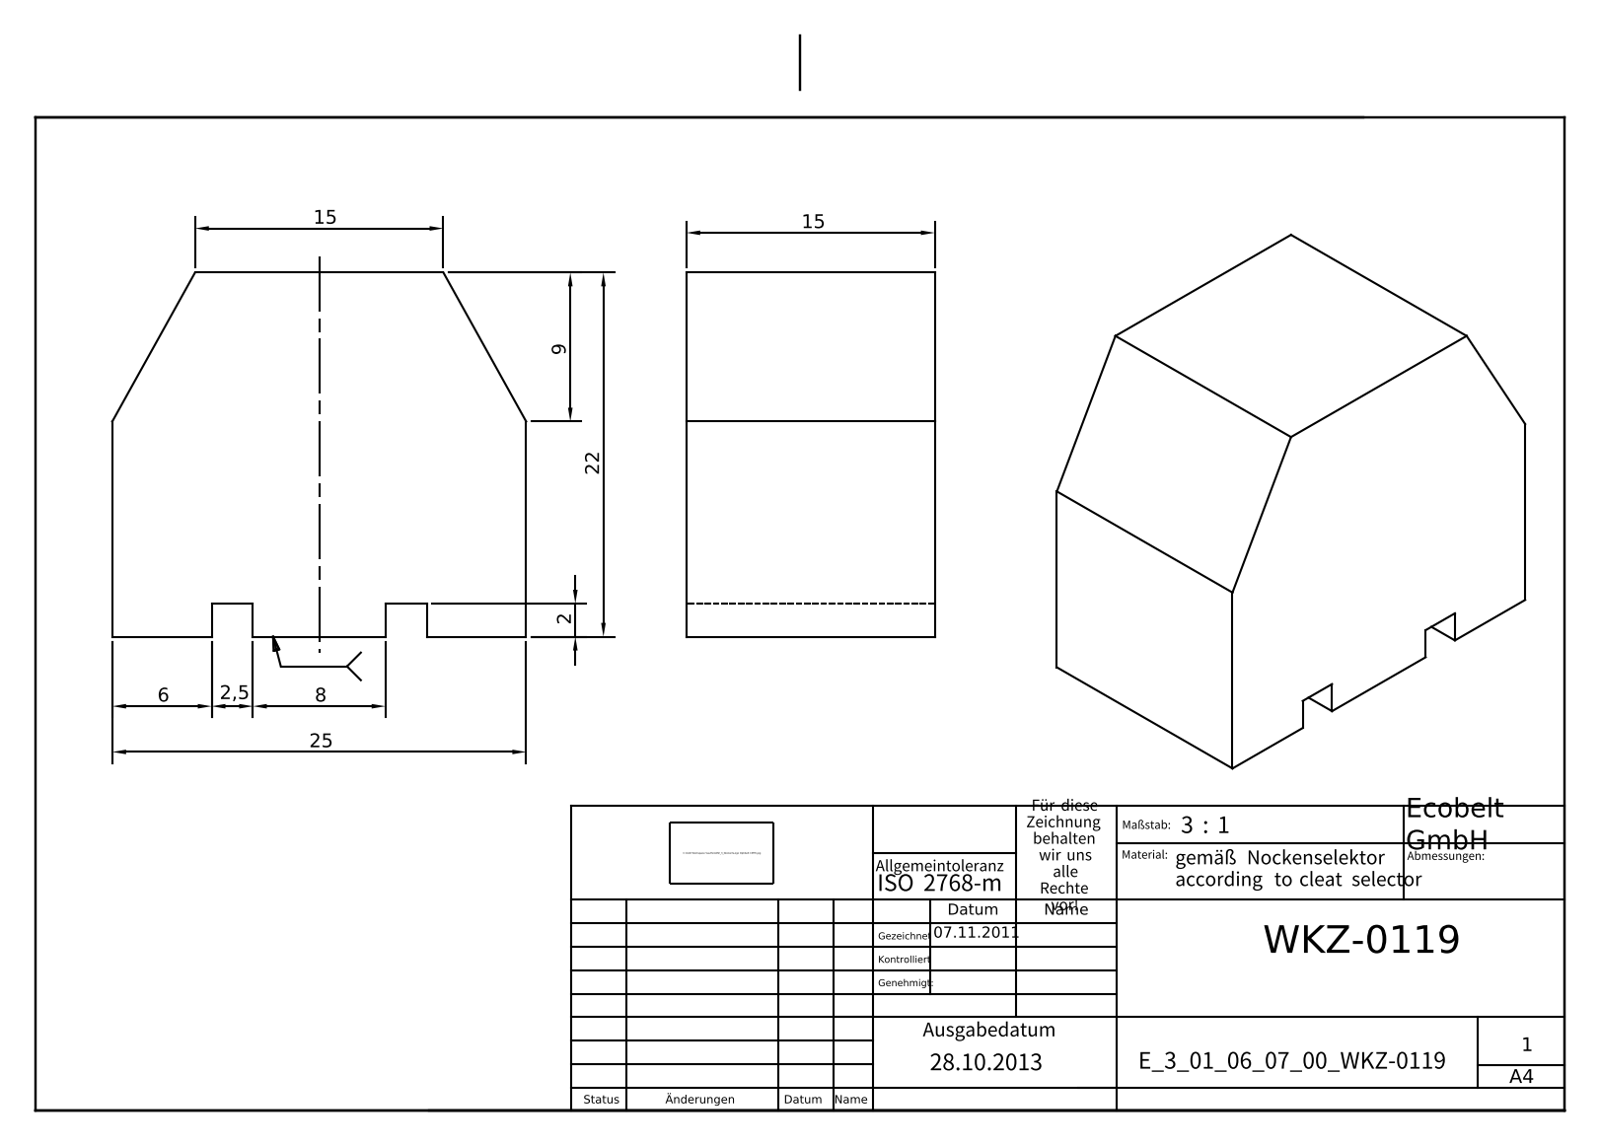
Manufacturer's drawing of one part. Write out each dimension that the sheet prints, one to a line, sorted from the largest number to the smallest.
25
22
15
15
9
8
6
2,5
2
